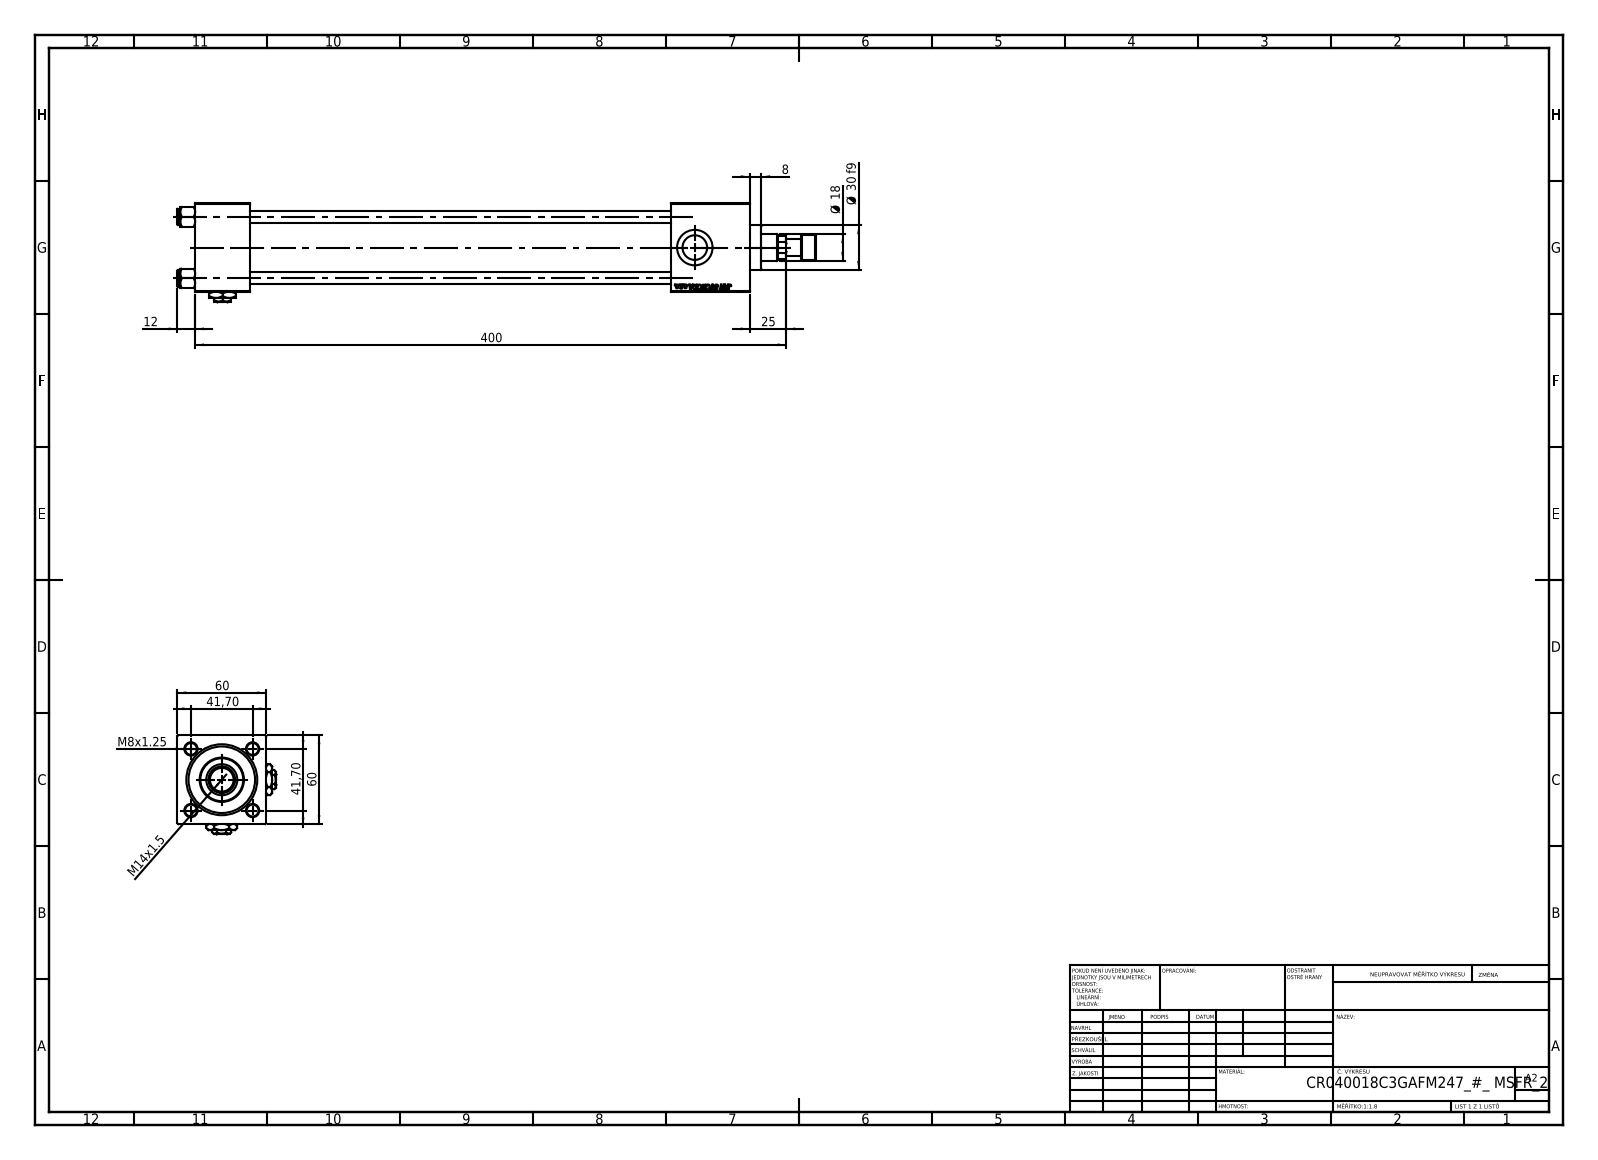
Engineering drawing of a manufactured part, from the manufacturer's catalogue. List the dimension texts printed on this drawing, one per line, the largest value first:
400
60
60
41,70
41,70
Ø 30 f9
25
Ø 18
M14x1.5
12
8
M8x1.25
